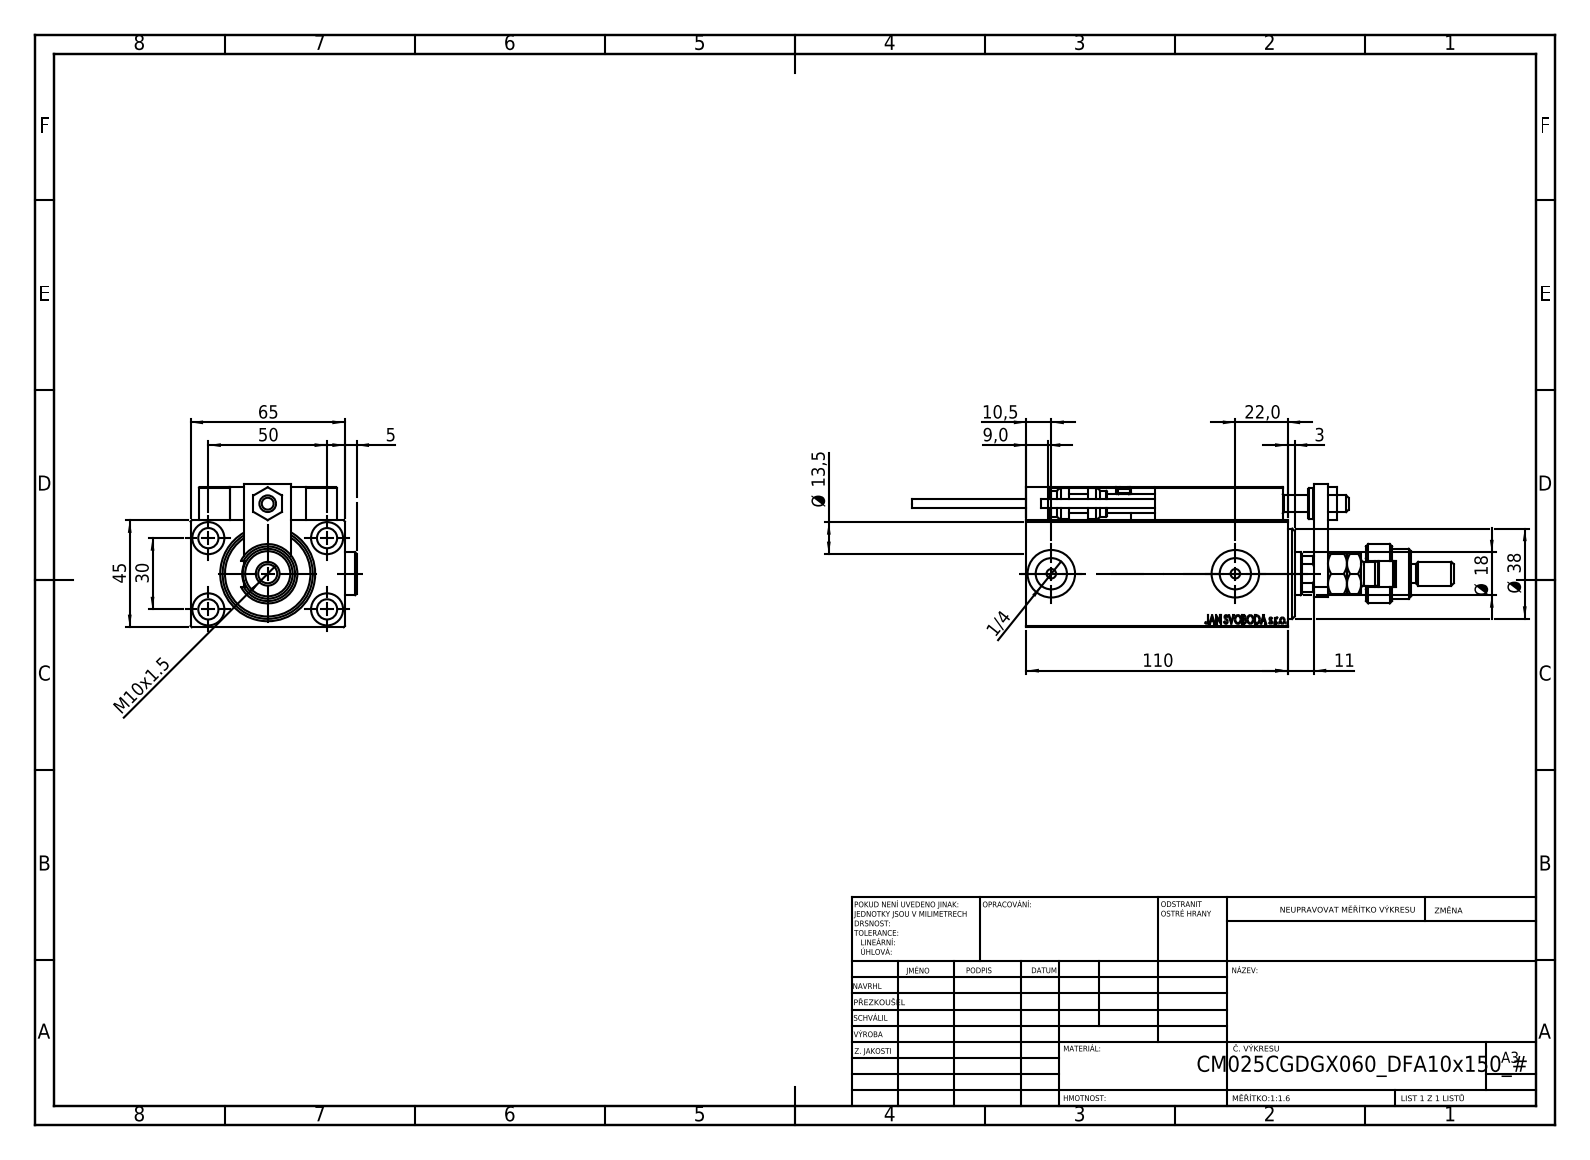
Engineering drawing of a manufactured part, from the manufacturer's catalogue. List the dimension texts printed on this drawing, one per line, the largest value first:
110
65
50
45
Ø 38
30
22,0
Ø 18
Ø 13,5
11
10,5
M10x1.5
9,0
5
3
1/4
